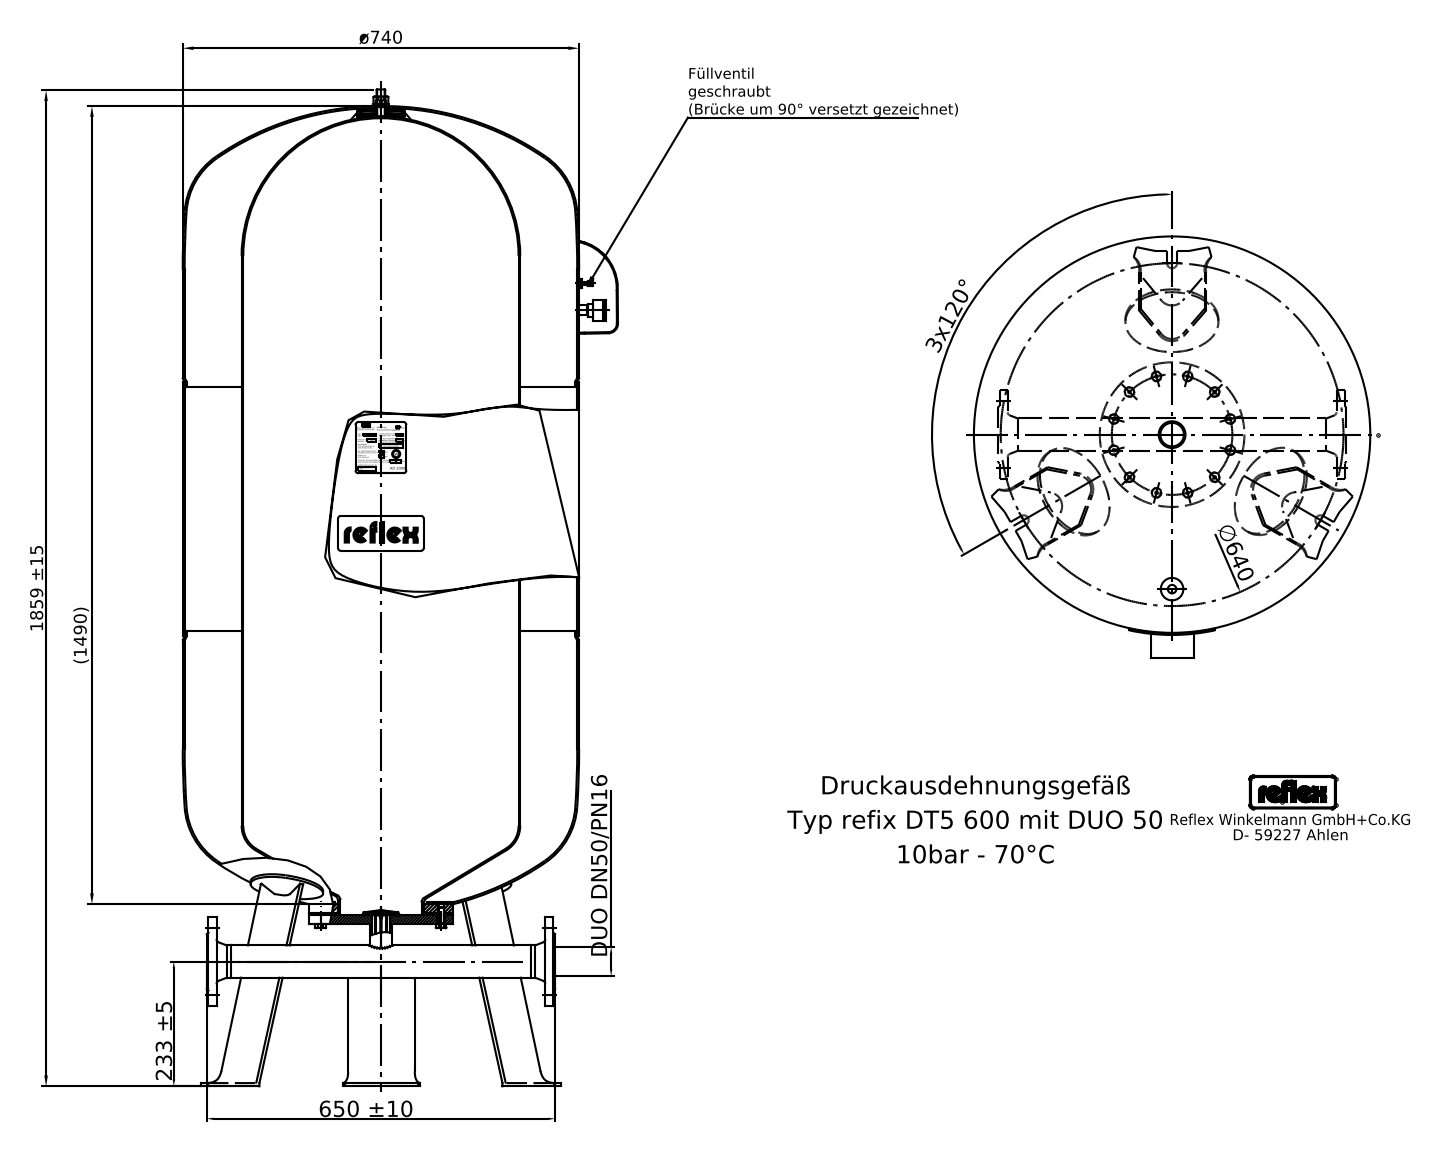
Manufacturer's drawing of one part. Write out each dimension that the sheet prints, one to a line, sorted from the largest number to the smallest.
1859 ±15
(1490)
ø740
650 ±10
∅640
233 ±5
3x120°
DUO DN50/PN16
